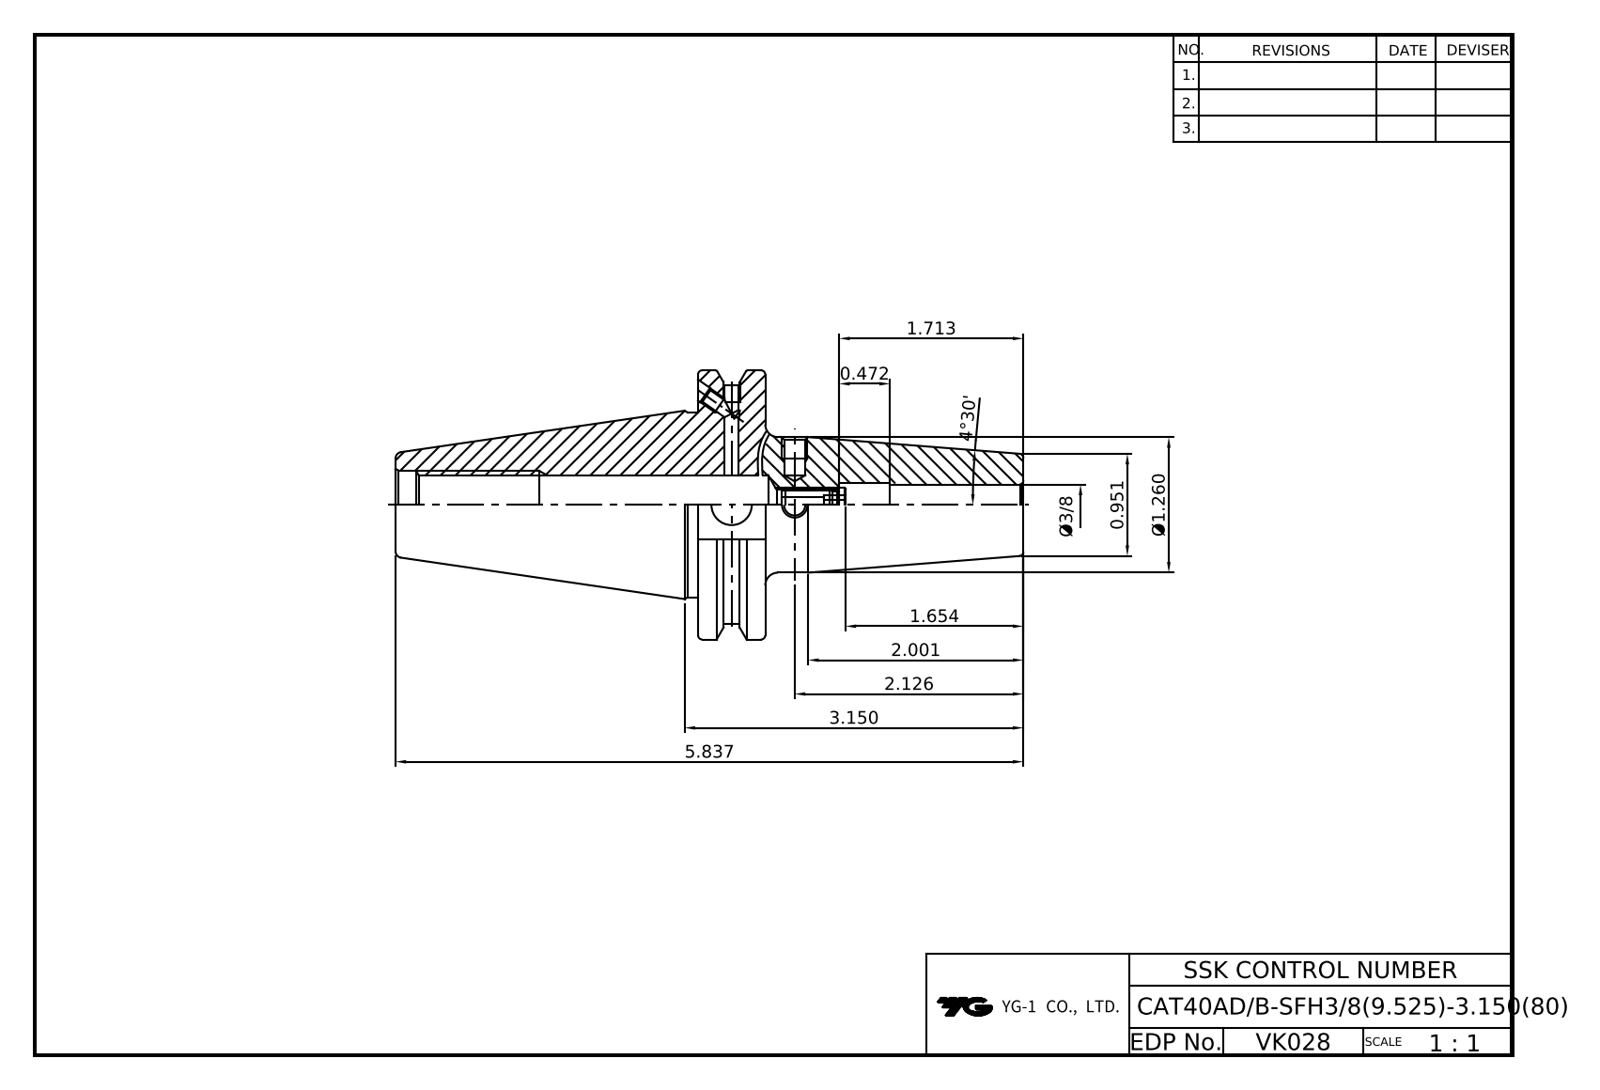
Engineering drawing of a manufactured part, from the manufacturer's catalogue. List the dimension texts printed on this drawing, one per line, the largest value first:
5.837
4°30'
3.150
2.126
2.001
1.713
1.654
Ø1.260
0.951
0.472
